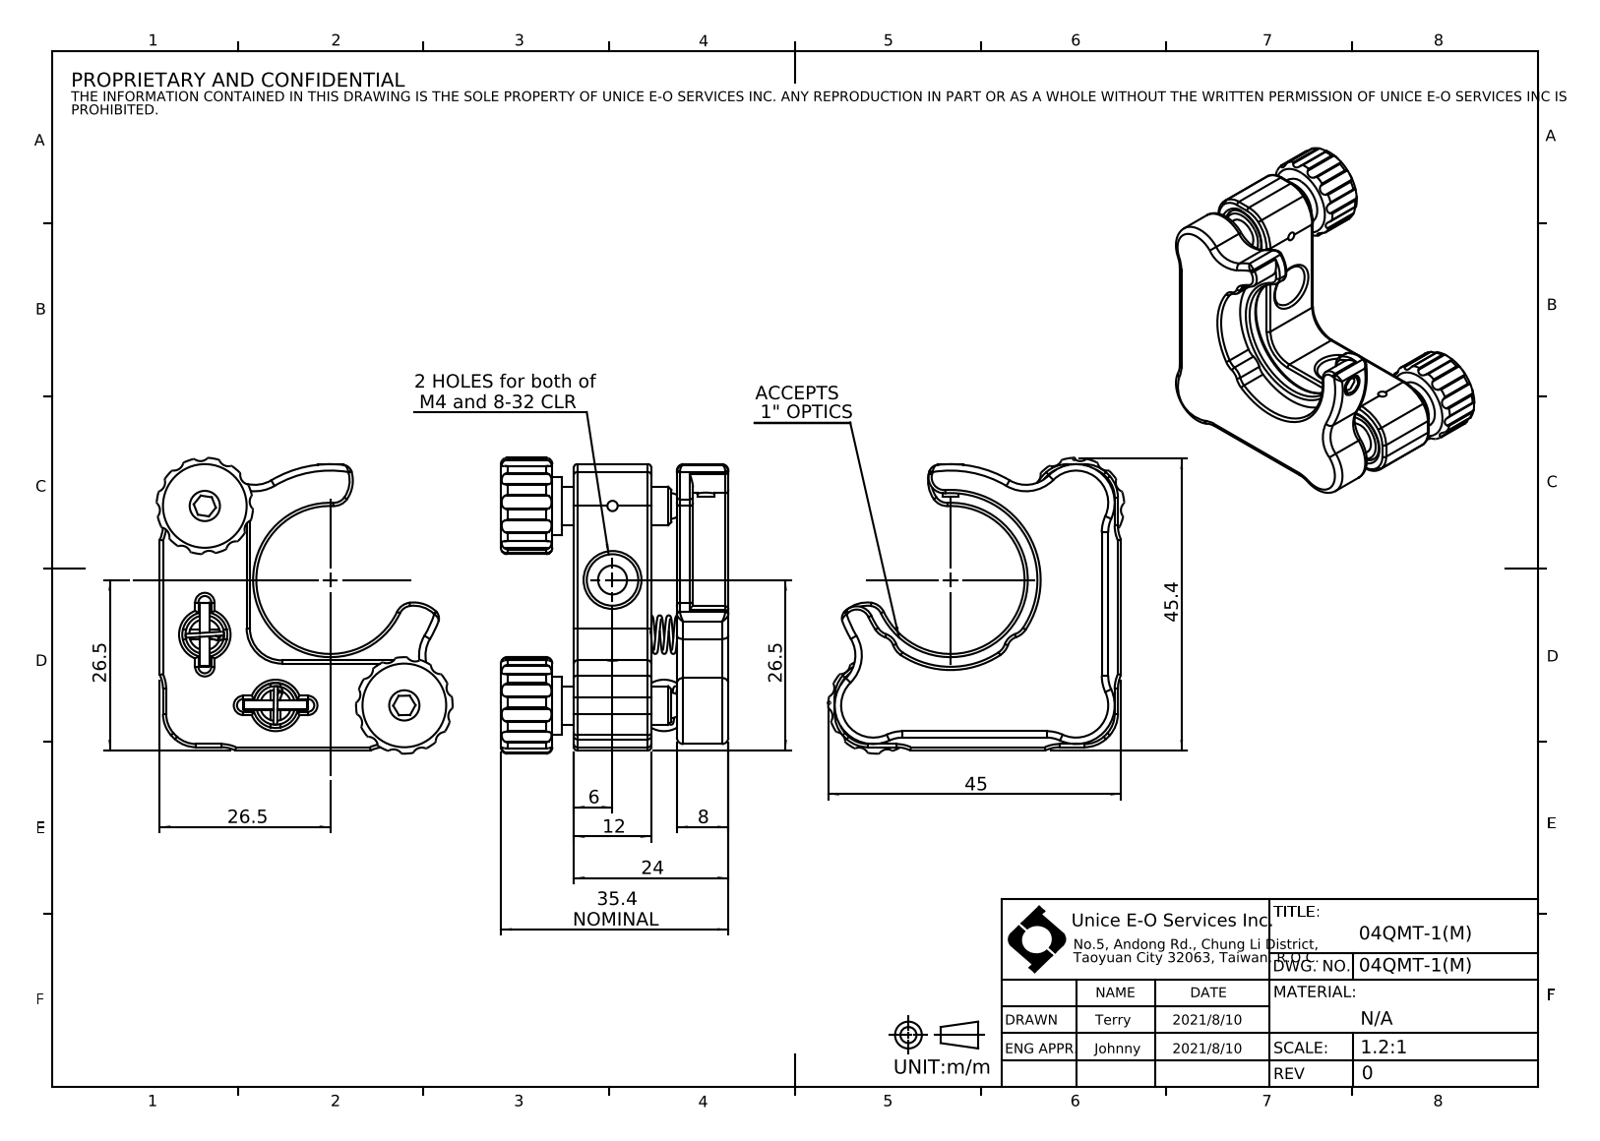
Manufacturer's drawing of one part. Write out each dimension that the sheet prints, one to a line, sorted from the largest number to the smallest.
45.4
45
35.4 NOMINAL
26.5
26.5
26.5
24
12
8
6
2 HOLES for both of M4 and 8-32 CLR
